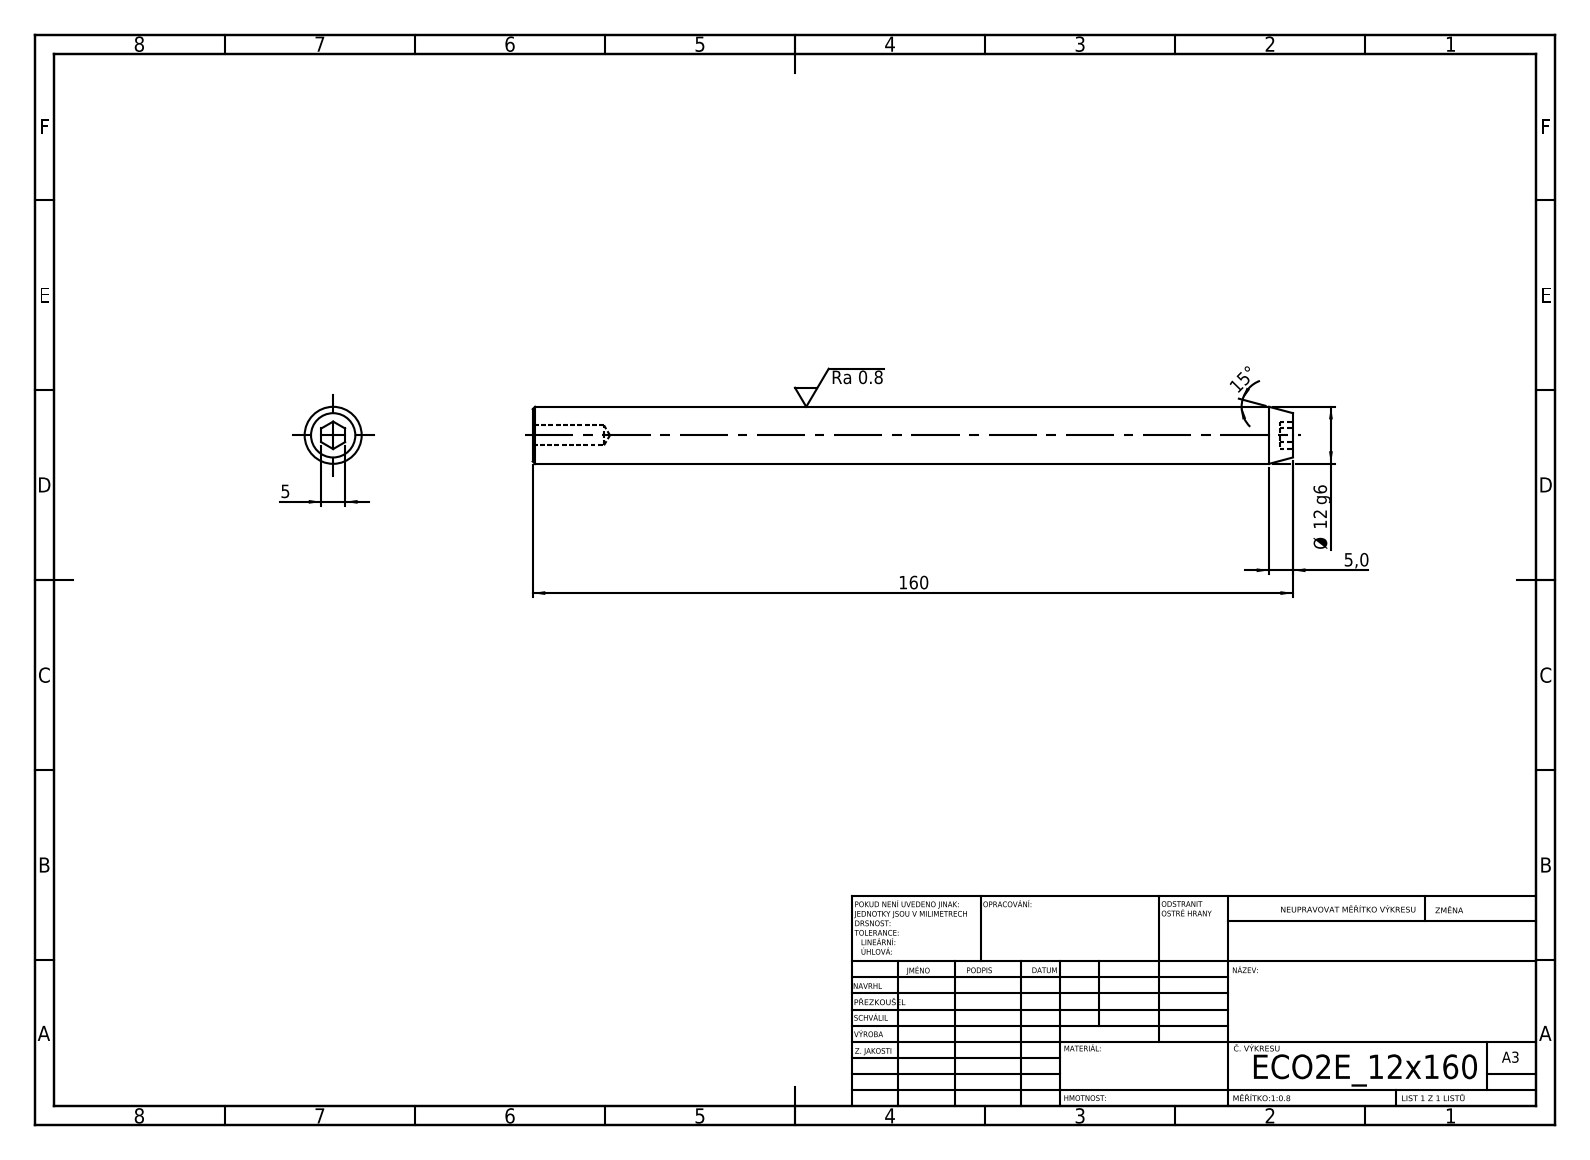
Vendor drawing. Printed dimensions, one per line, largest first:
160
15°
Ø 12 g6
5,0
5
